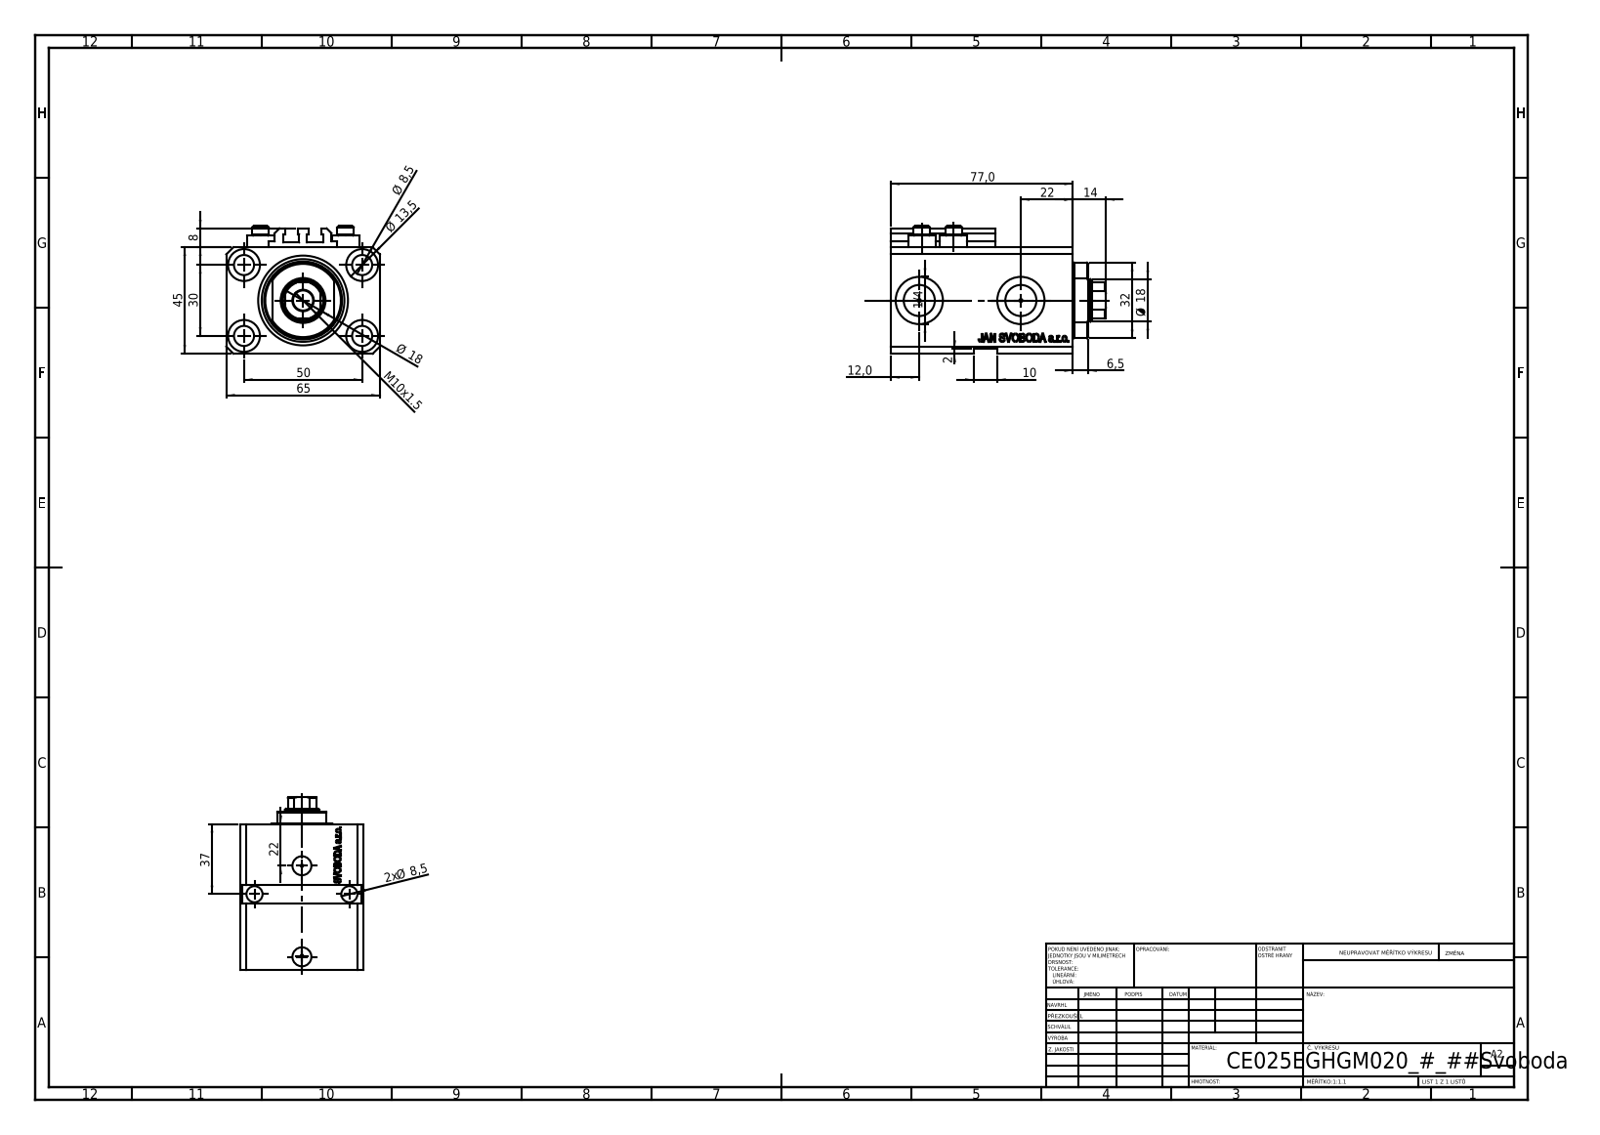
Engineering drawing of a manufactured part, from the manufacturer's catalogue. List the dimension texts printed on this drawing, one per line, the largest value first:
77,0
65
50
45
37
32
30
22
22
Ø 18
Ø 18
14
Ø 13,5
12,0
M10x1.5
10
Ø 8,5
2x Ø 8,5
8
6,5
2
1/4
